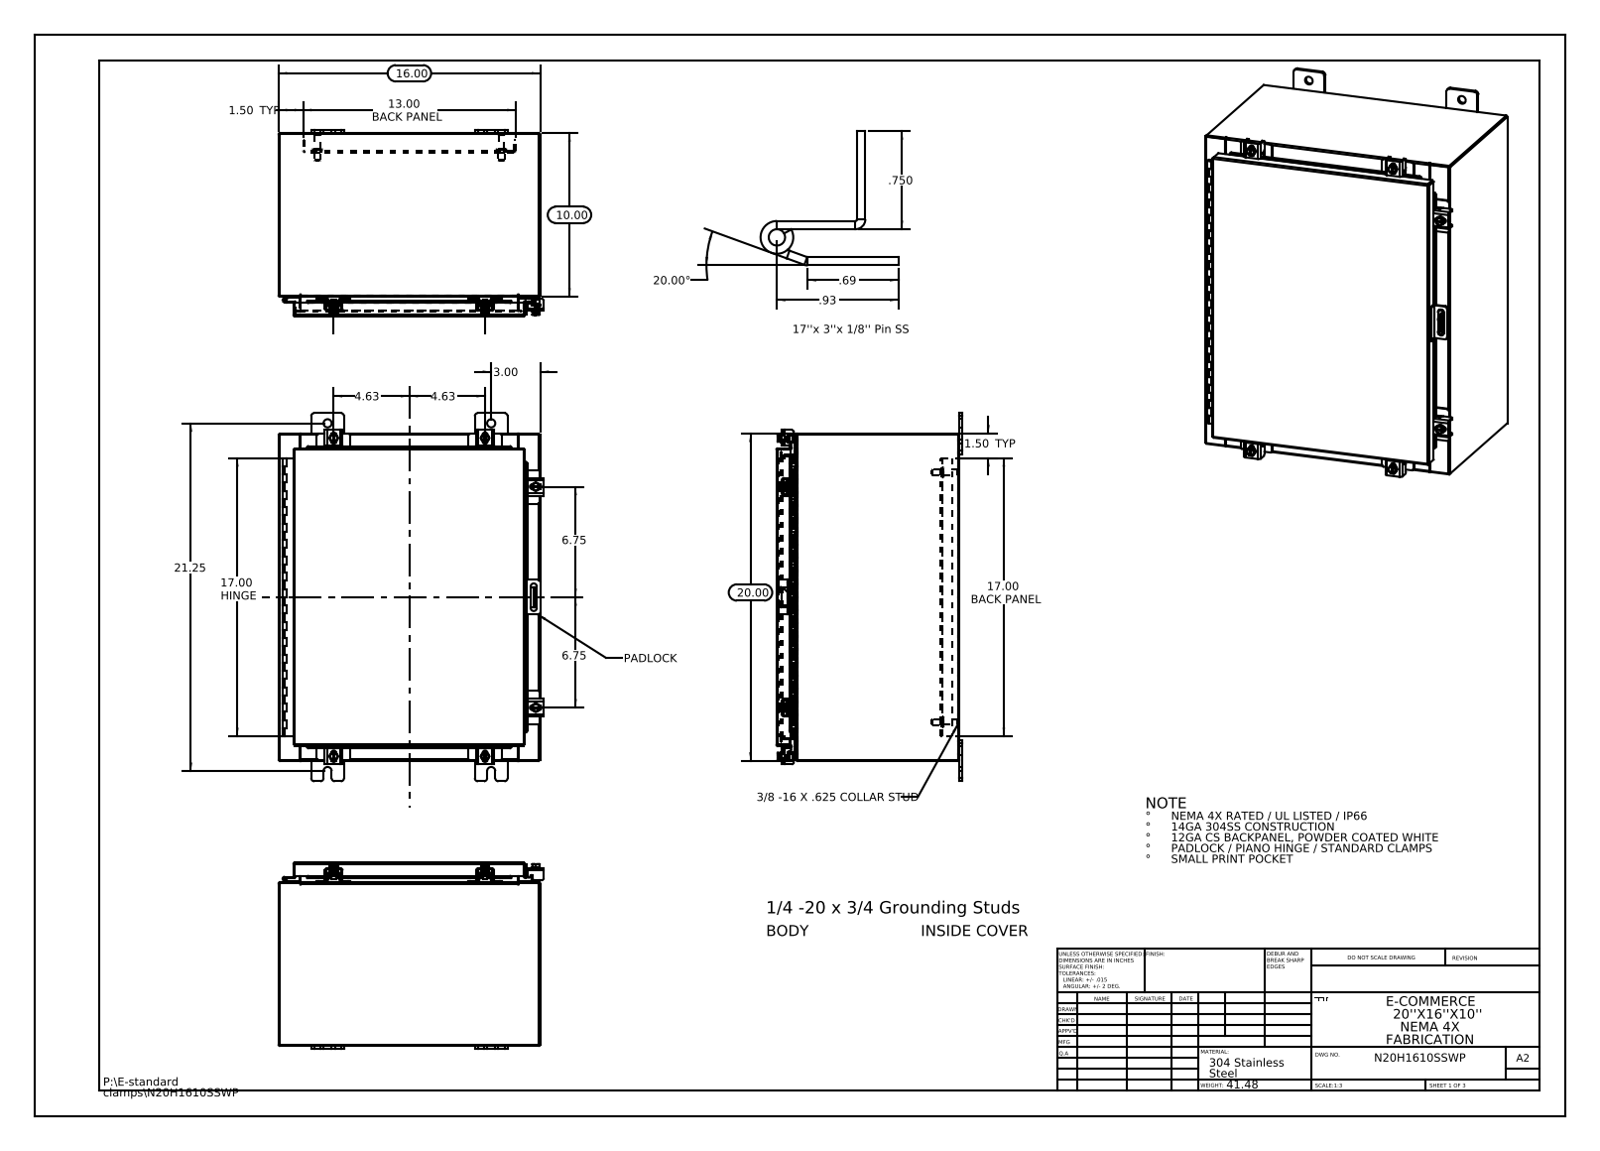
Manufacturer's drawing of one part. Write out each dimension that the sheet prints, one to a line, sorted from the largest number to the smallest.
21.25
20.00
20.00°
17.00 HINGE
17.00 BACK PANEL
16.00
13.00 BACK PANEL
10.00
6.75
6.75
4.63
4.63
3.00
1.50 TYP
1.50 TYP
.93
.750
.69
